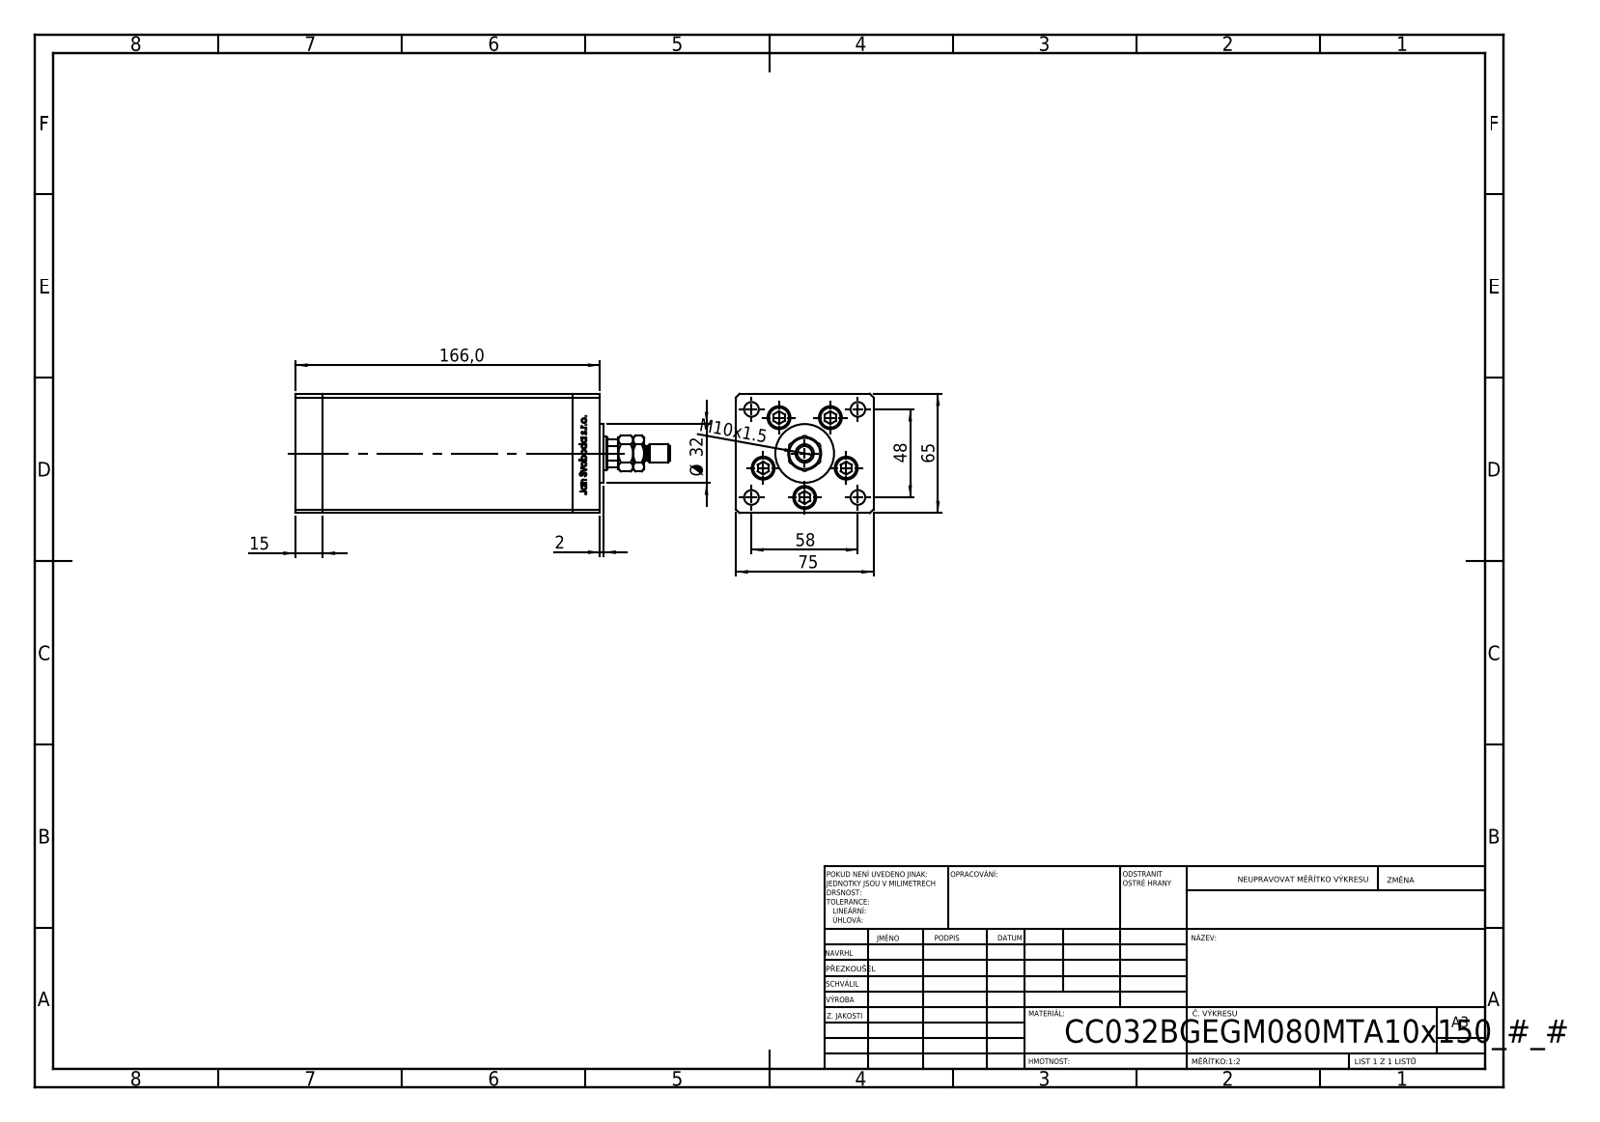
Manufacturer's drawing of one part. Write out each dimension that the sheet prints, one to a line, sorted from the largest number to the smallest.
166,0
75
65
58
48
Ø 32
15
M10x1.5
2
